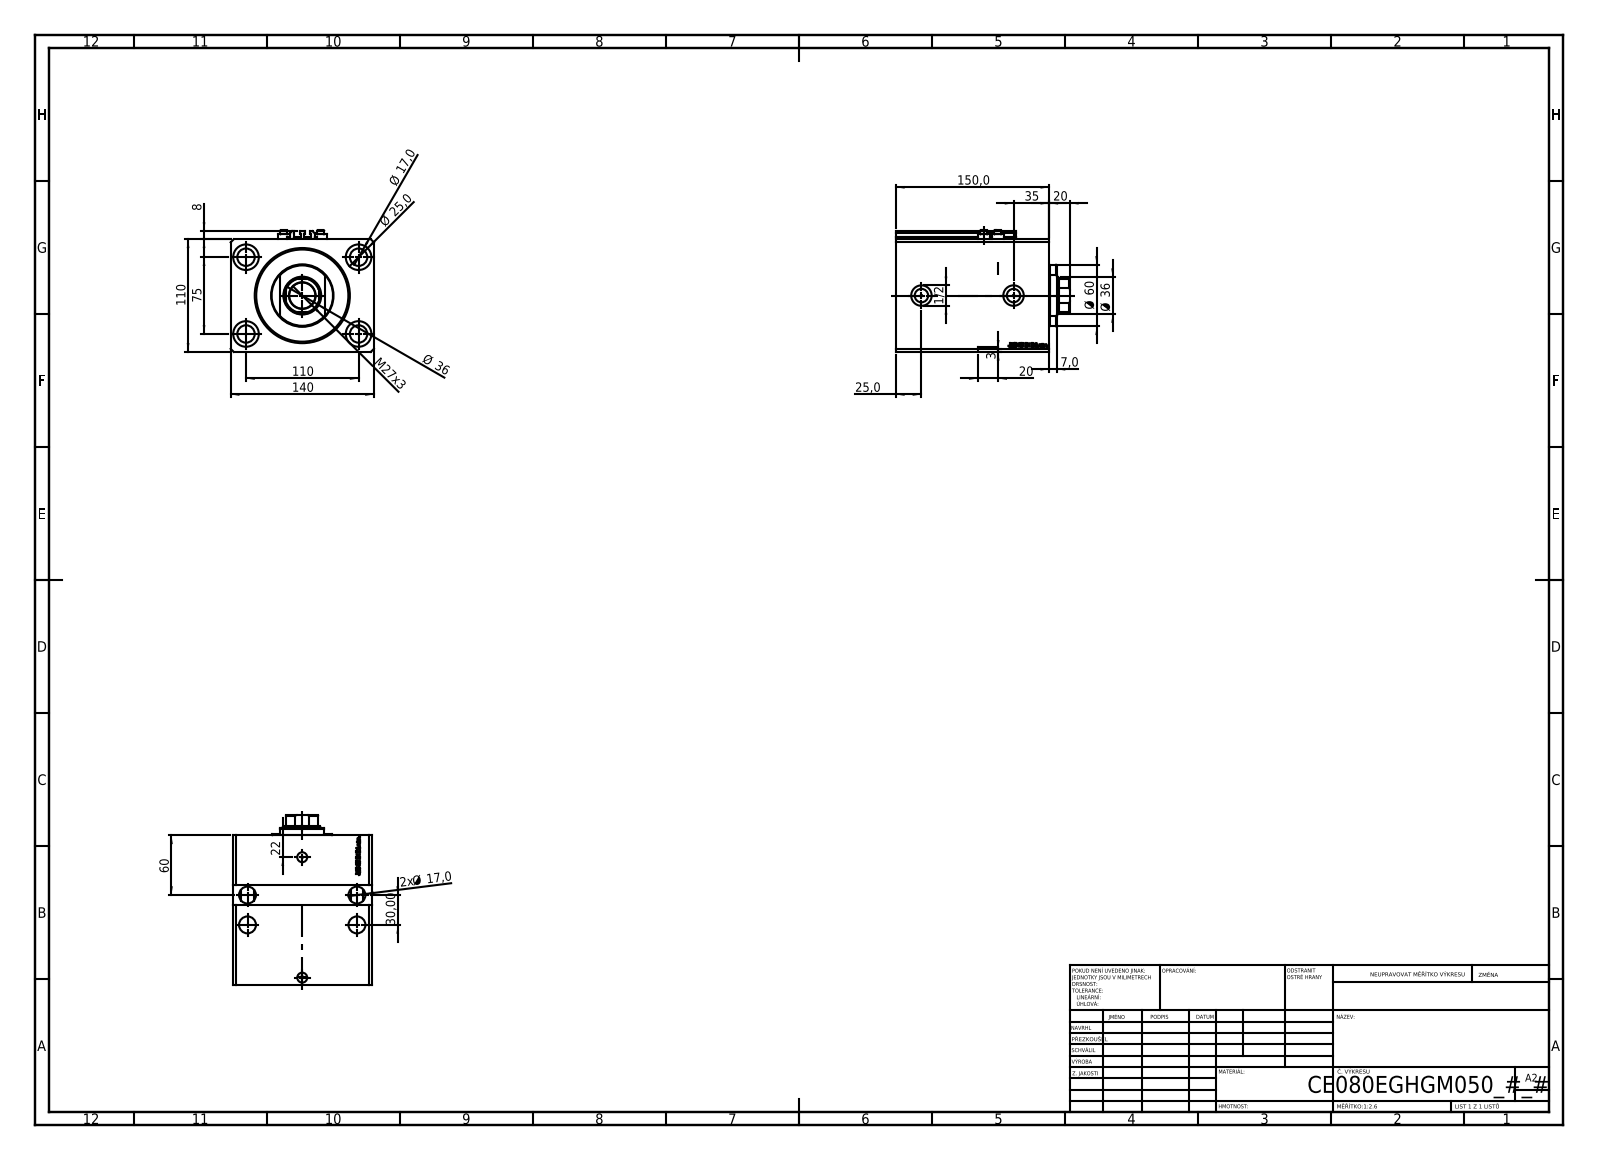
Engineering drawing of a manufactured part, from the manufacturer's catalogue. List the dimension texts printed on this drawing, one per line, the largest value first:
150,0
140
110
110
75
Ø 60
60
Ø 36
Ø 36
35
30,00
M27x3
Ø 25,0
25,0
22
20
20
Ø 17,0
2x Ø 17,0
8
7,0
3
1/2
